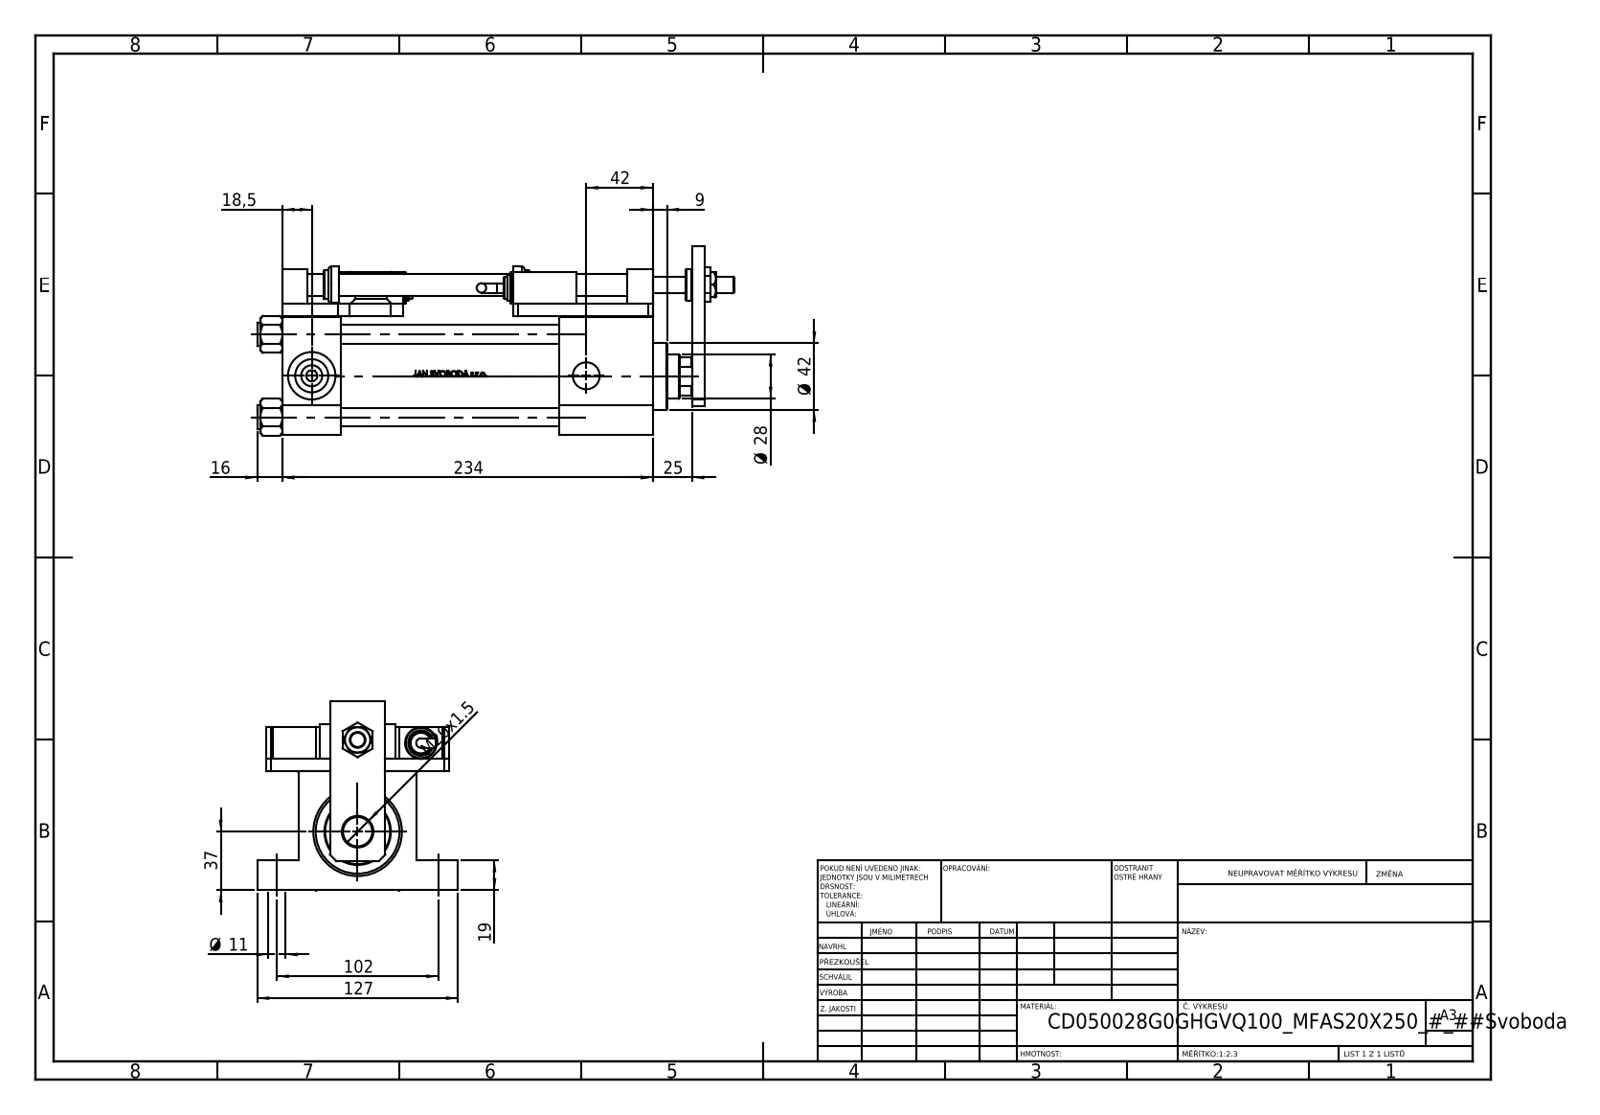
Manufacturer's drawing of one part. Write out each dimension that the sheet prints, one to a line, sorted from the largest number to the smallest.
234
127
102
Ø 42
42
37
Ø 28
25
M20x1.5
19
18,5
16
Ø 11
9
